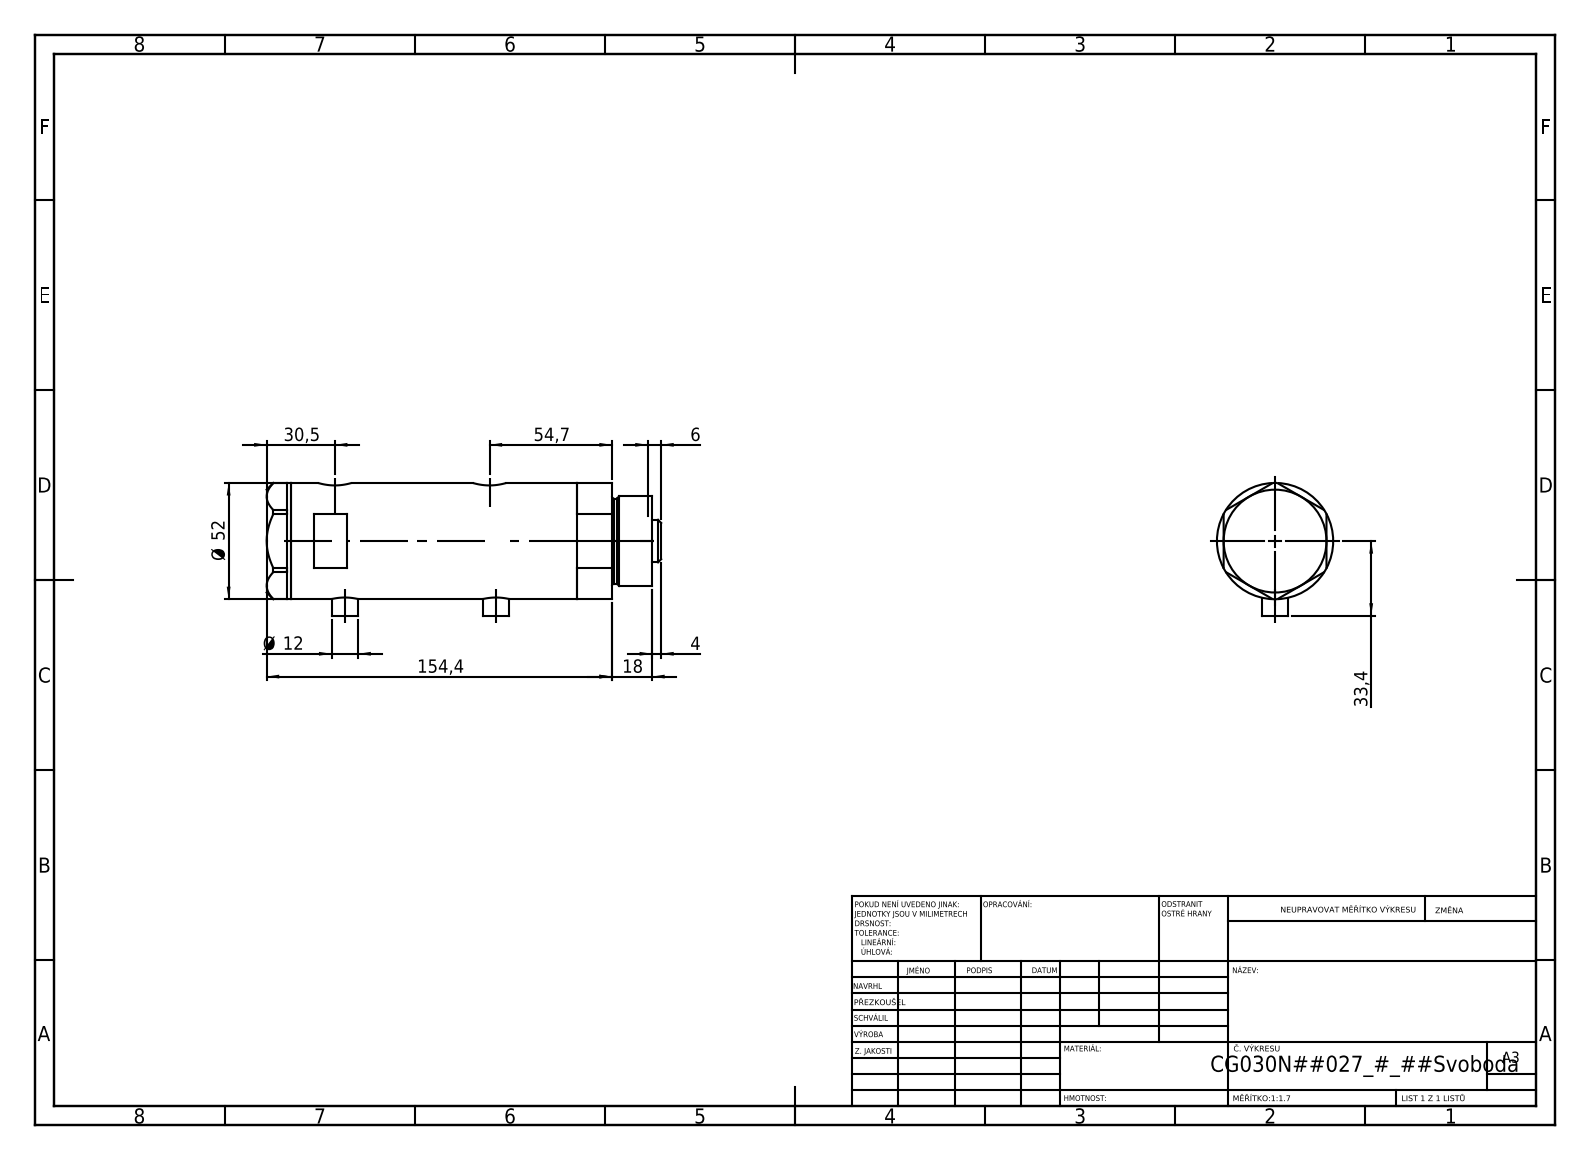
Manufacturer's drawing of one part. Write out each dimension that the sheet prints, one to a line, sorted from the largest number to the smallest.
154,4
54,7
Ø 52
33,4
30,5
18
Ø 12
6
4
